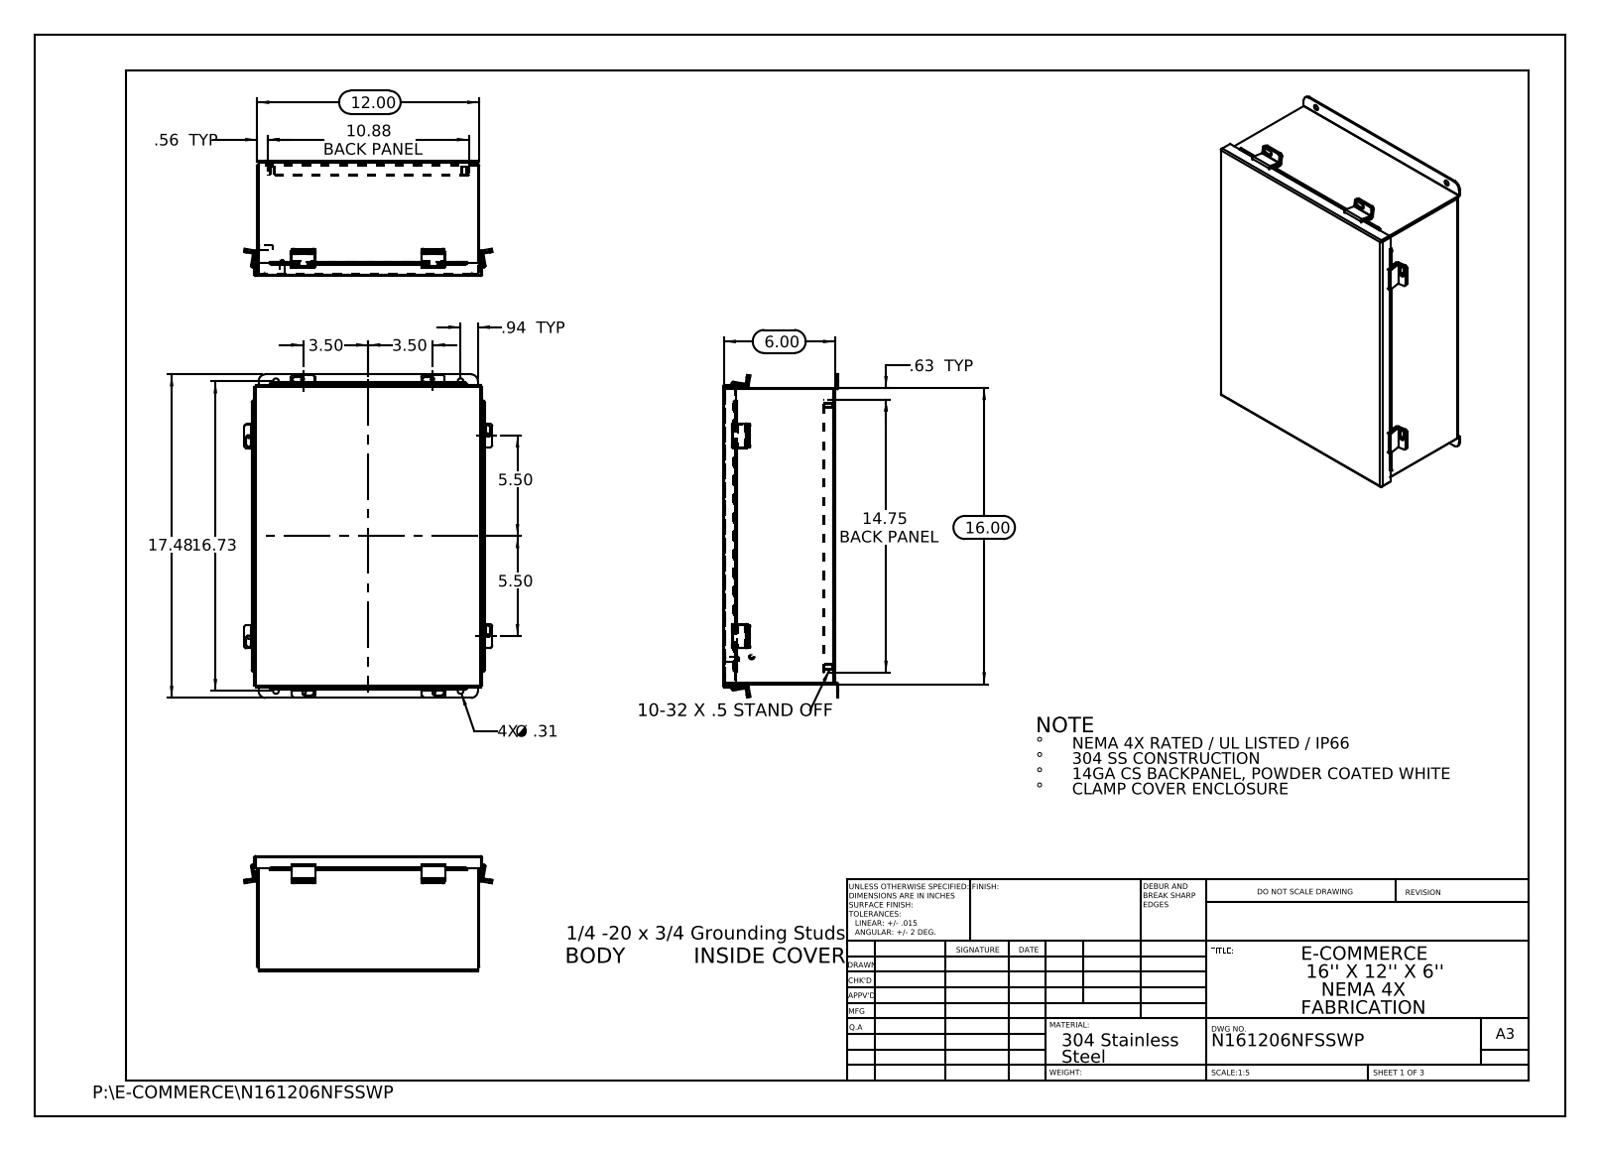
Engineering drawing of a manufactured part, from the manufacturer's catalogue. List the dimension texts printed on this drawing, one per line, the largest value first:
17.48
16.73
16.00
14.75 BACK PANEL
12.00
10.88 BACK PANEL
6.00
5.50
5.50
3.50
3.50
.94 TYP
.63 TYP
.56 TYP
4X Ø .31
